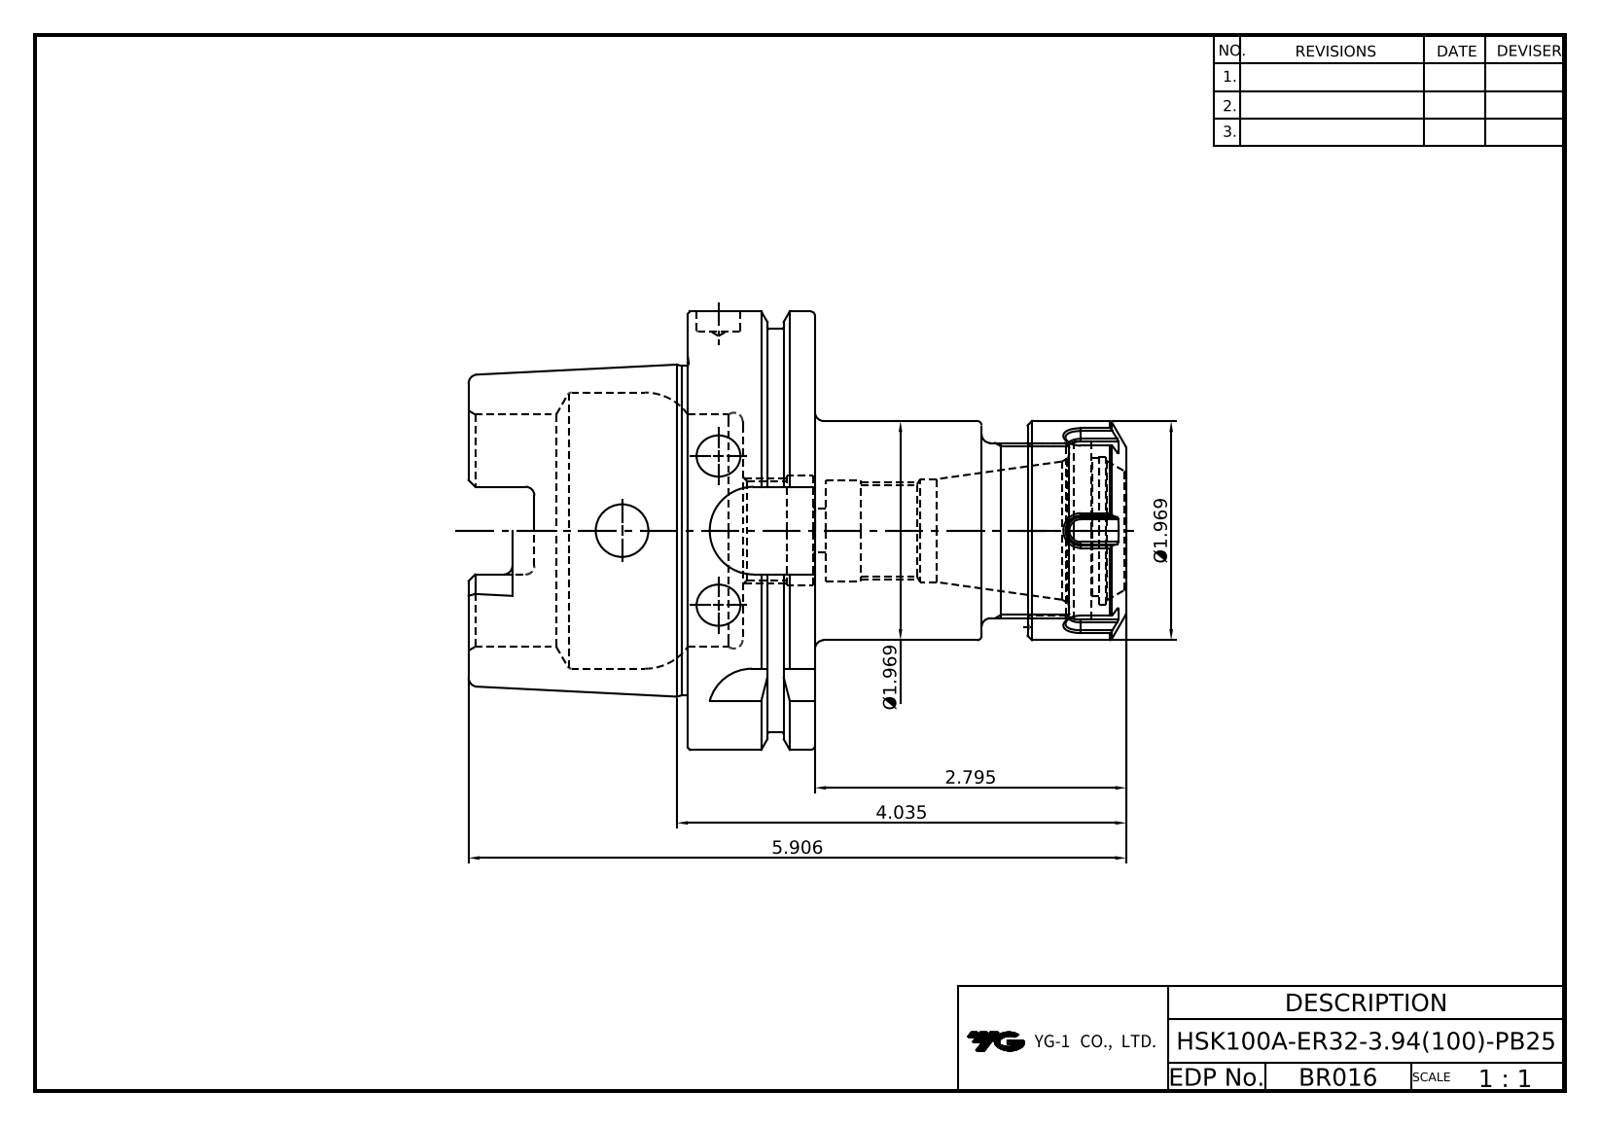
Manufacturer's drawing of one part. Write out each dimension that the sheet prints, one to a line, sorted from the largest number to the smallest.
5.906
4.035
2.795
Ø1.969
Ø1.969
